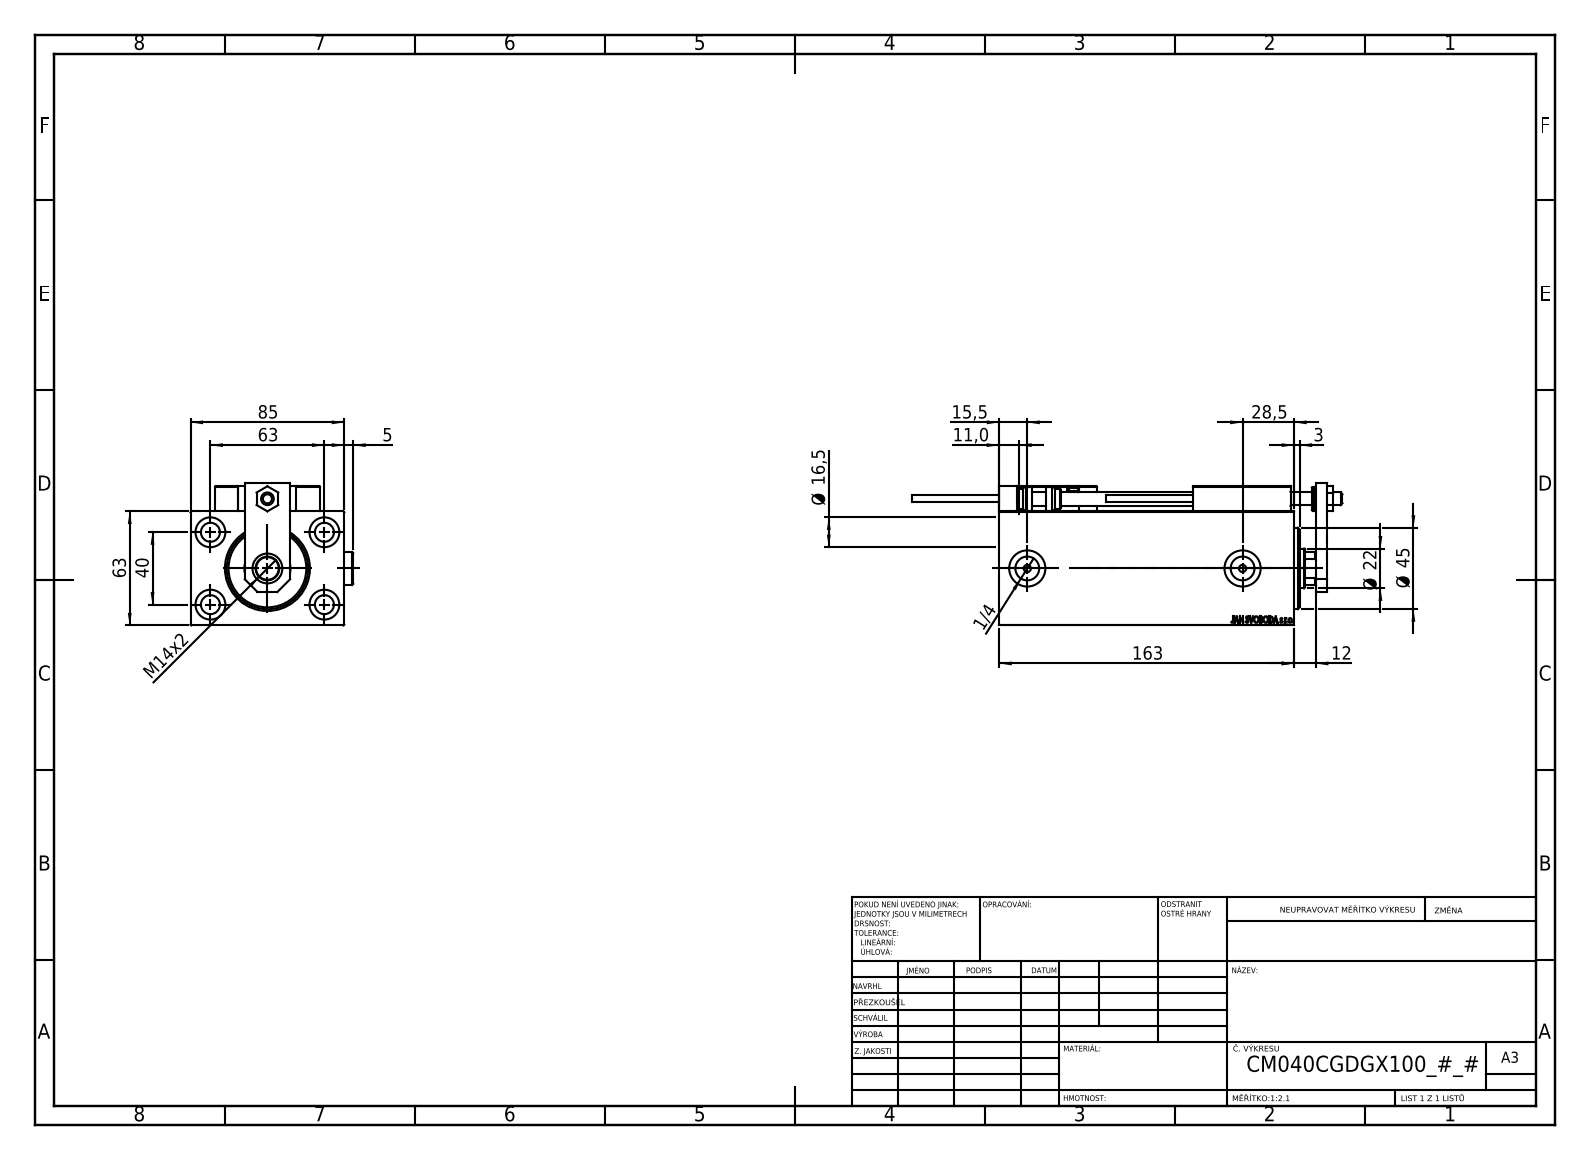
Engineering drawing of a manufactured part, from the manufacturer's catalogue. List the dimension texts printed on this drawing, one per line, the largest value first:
163
85
63
63
Ø 45
40
28,5
Ø 22
Ø 16,5
15,5
M14x2
12
11,0
5
3
1/4
